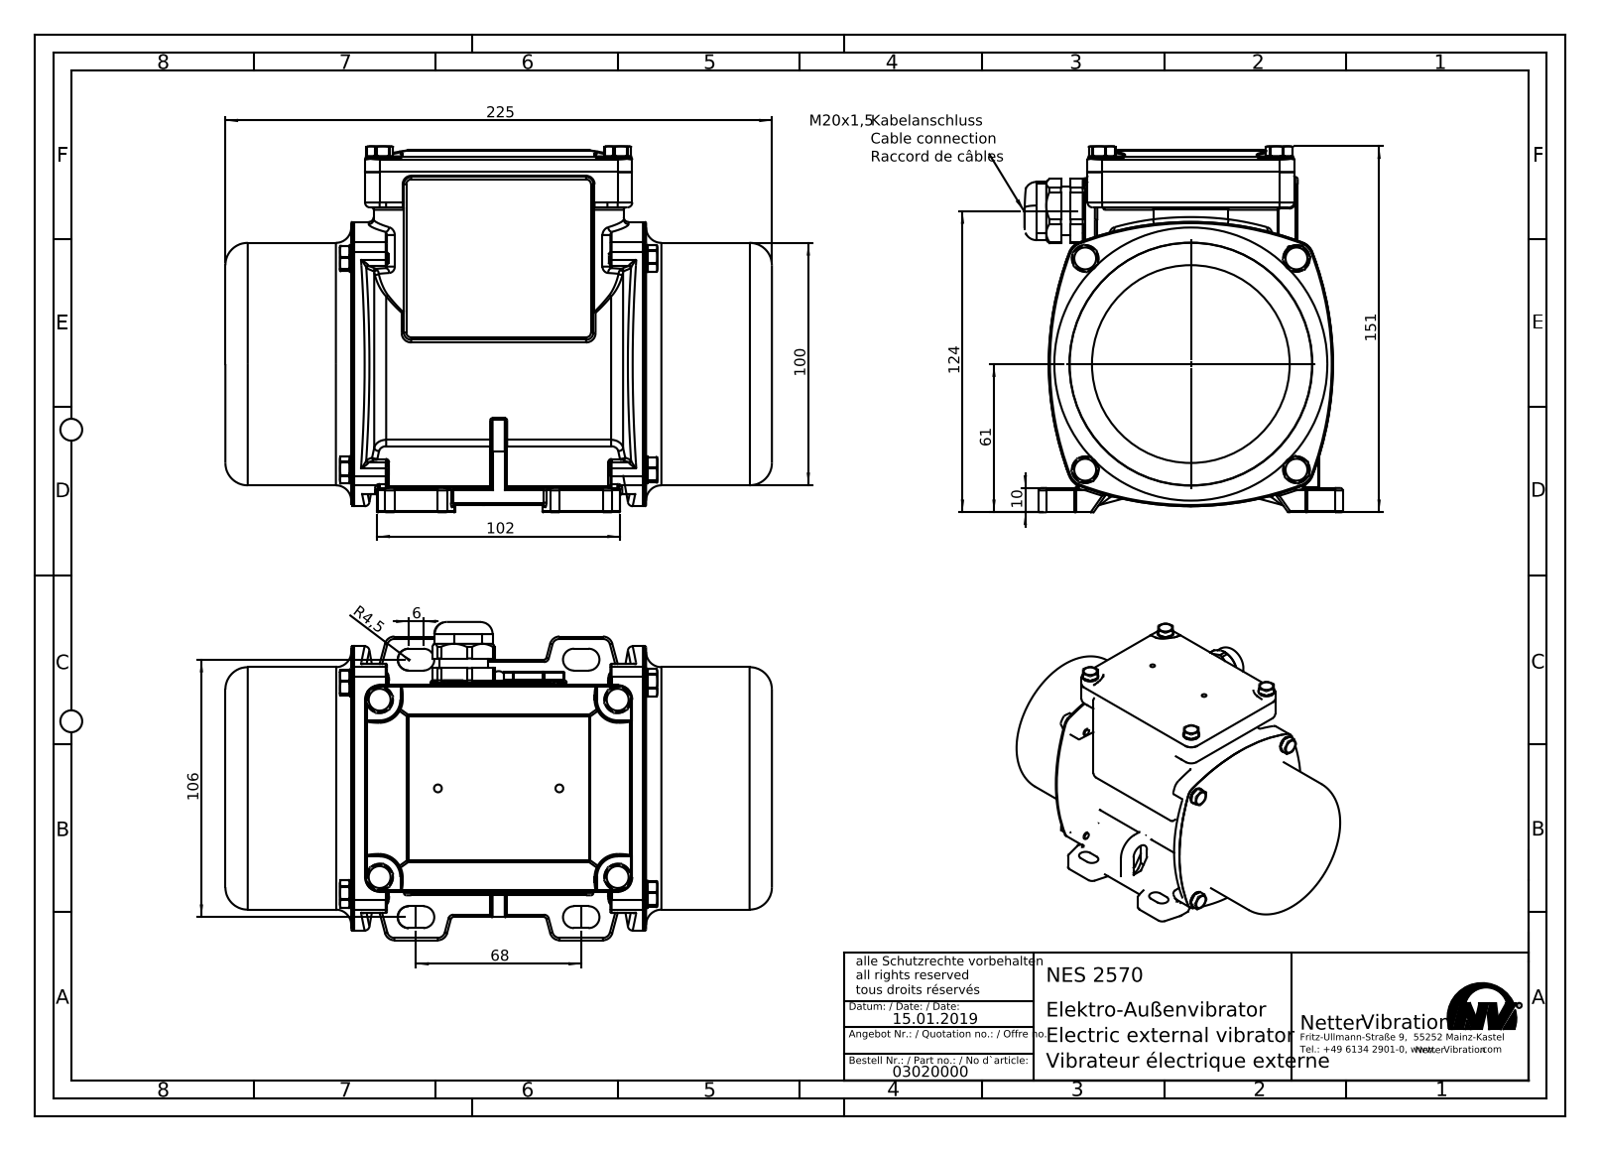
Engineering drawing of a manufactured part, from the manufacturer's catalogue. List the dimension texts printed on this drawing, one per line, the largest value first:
225
151
124
106
102
100
68
61
10
6
R4,5
